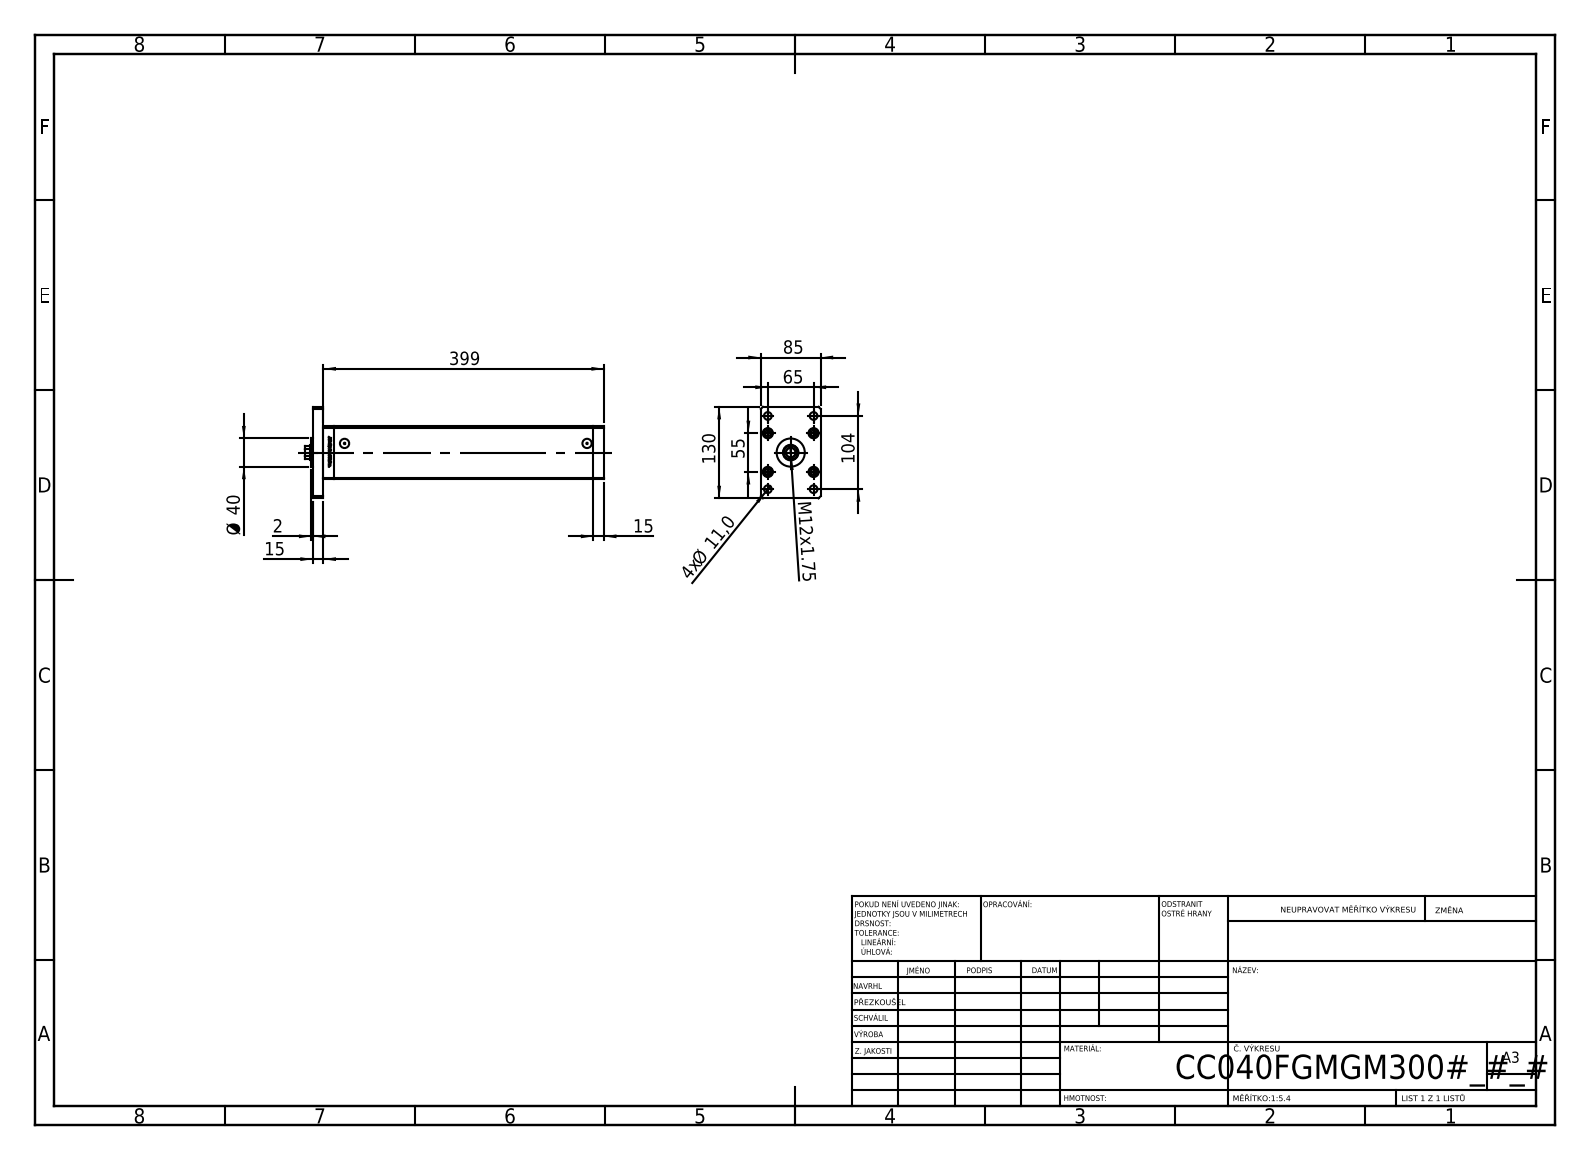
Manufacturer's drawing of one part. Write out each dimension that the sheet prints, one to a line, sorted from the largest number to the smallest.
399
130
104
85
65
55
Ø 40
15
15
M12x1.75
4x Ø 11,0
2
